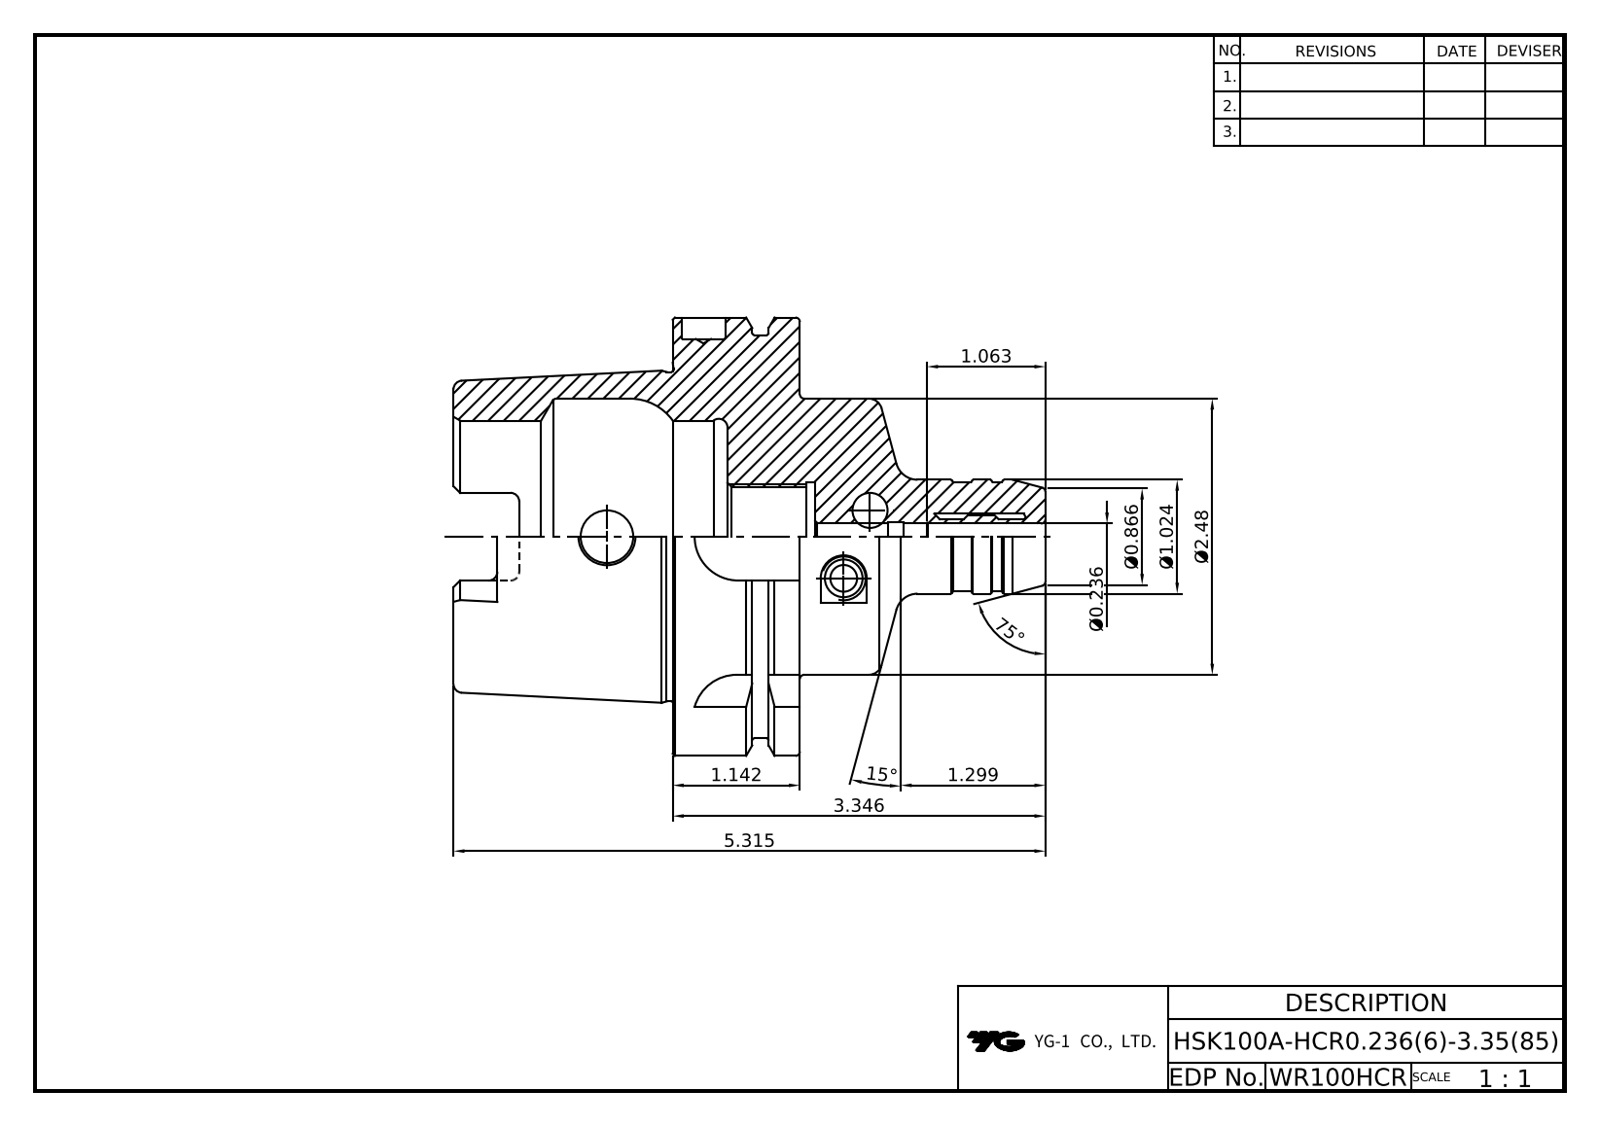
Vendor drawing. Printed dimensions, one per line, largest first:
75°
15°
5.315
3.346
Ø2.48
1.299
1.142
1.063
Ø1.024
Ø0.866
Ø0.236
